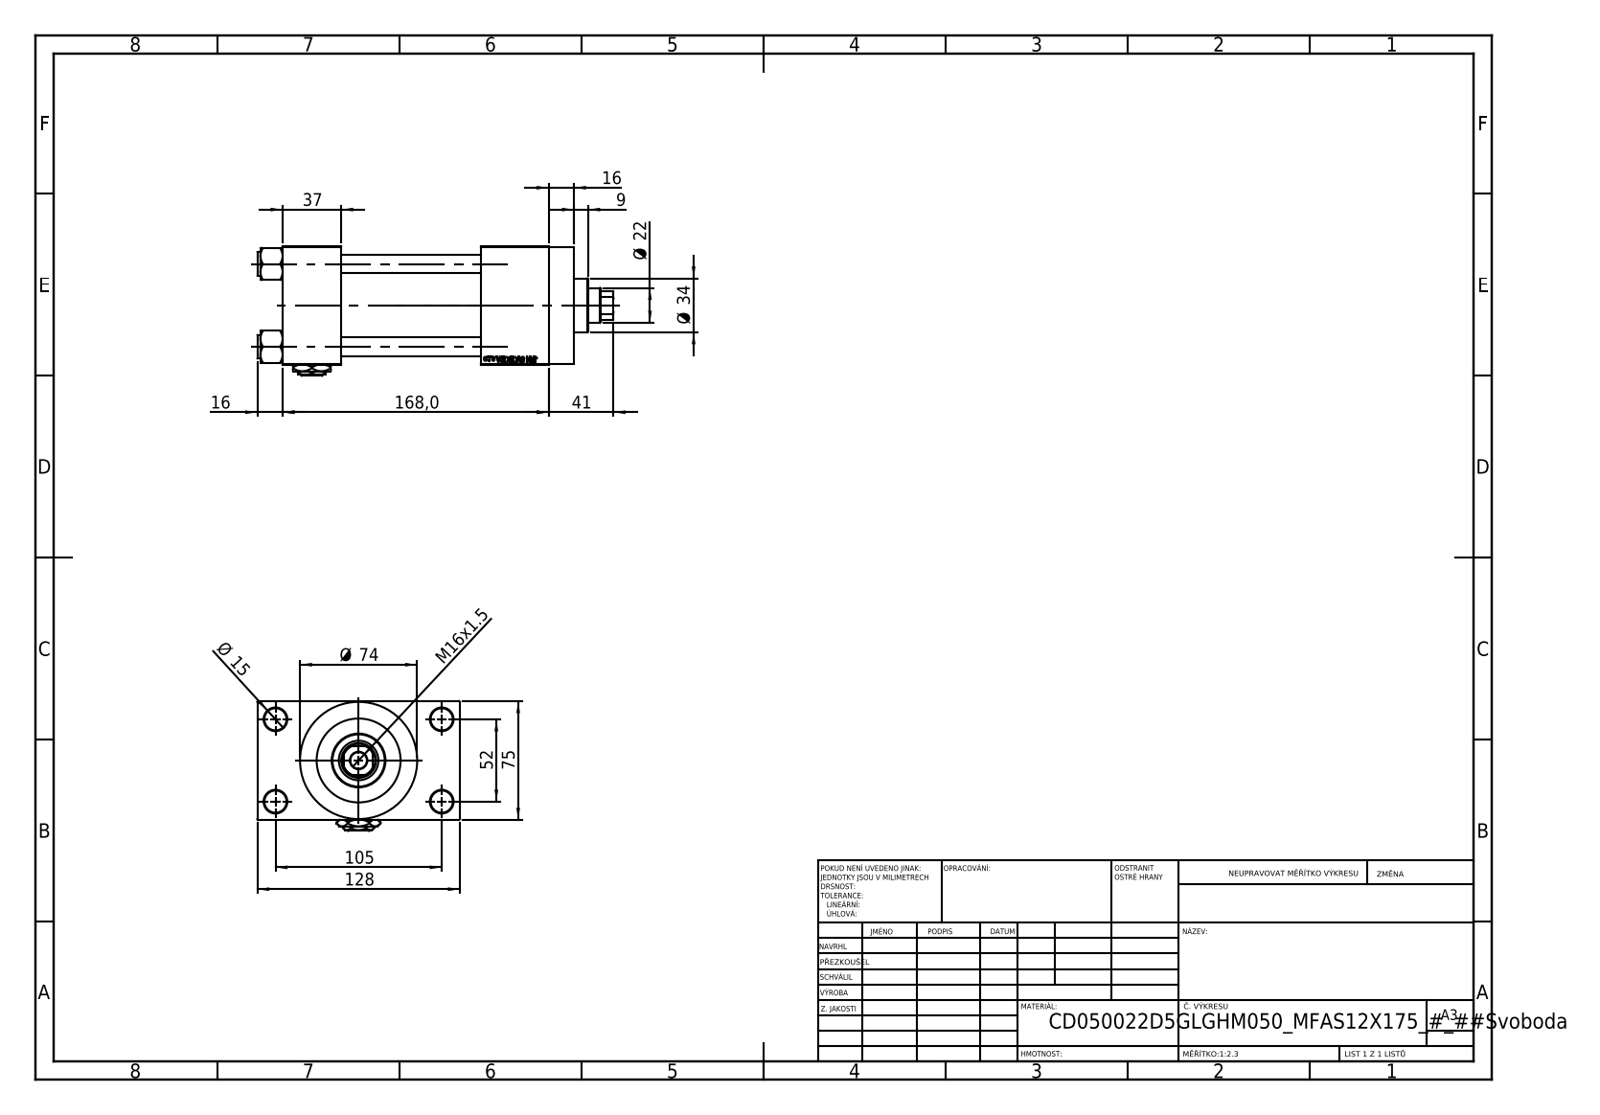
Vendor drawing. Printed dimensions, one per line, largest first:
168,0
128
105
75
Ø 74
52
41
37
Ø 34
Ø 22
16
16
M16x1.5
Ø 15
9
